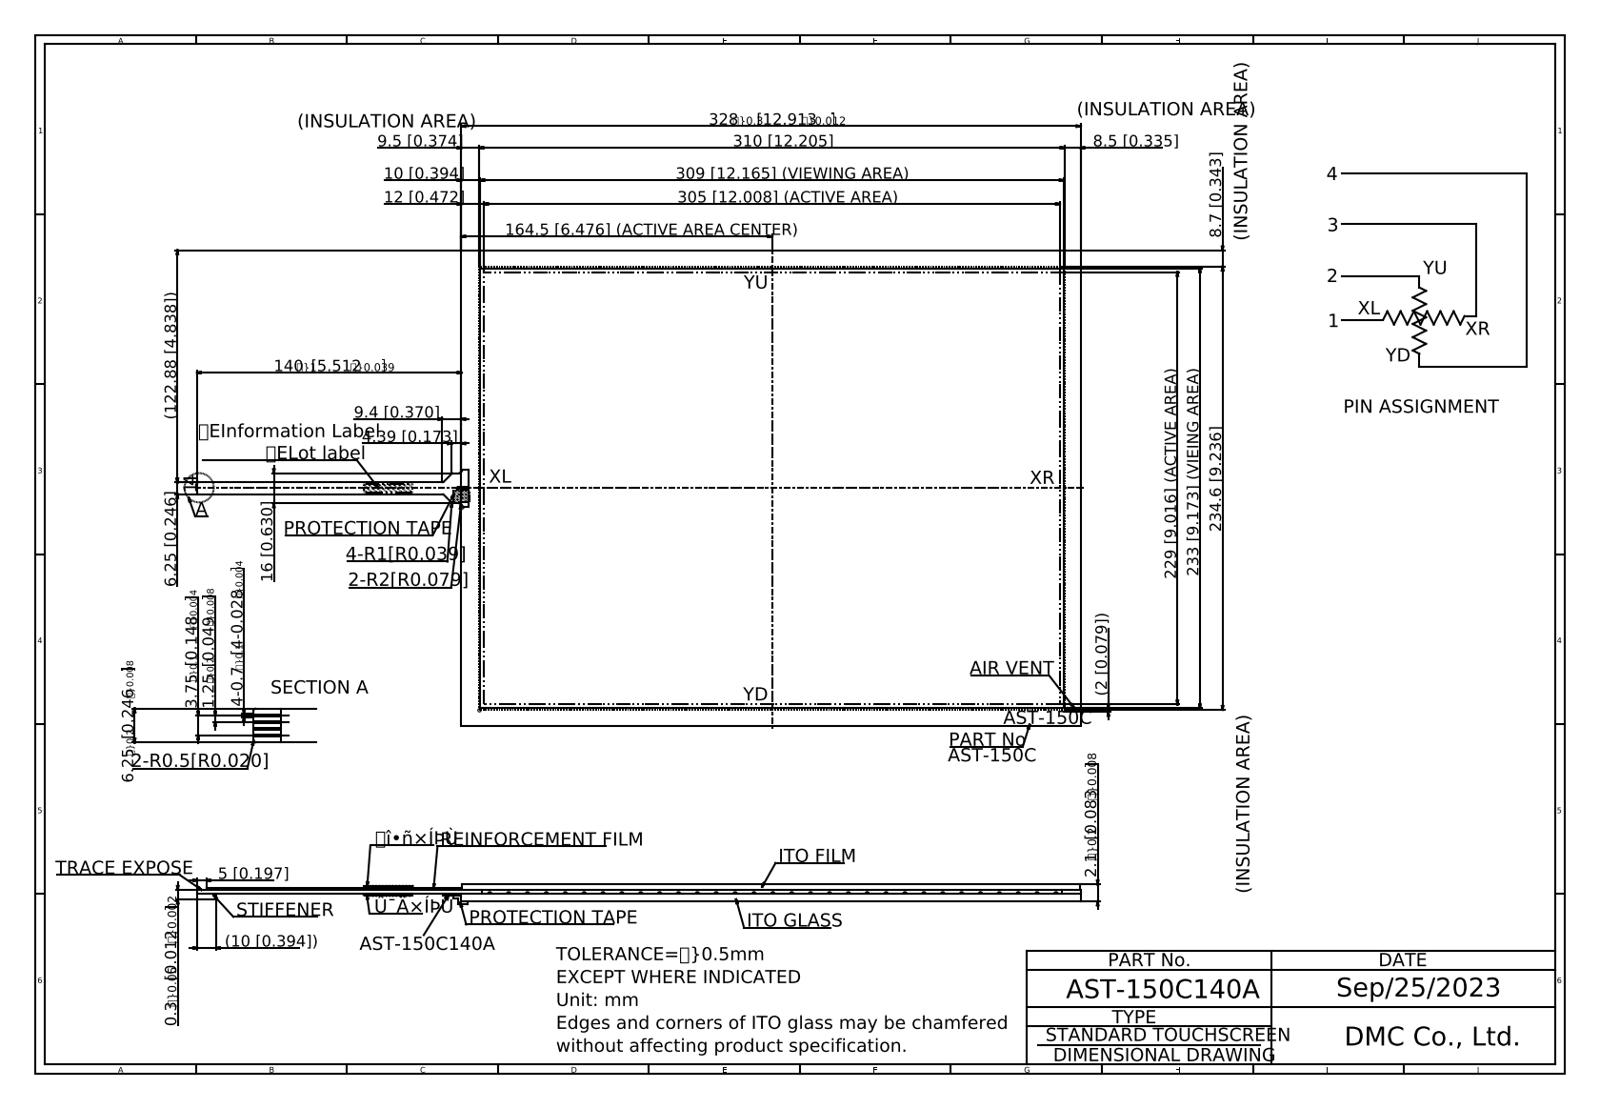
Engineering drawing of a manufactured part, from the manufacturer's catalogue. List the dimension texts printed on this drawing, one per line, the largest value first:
328.00
310 [12.205]
309 [12.165] (VIEWING AREA)
305 [12.008] (ACTIVE AREA)
234.6 [9.236]
233 [9.173] (VIEING AREA)
229 [9.016] (ACTIVE AREA)
164.5 [6.476] (ACTIVE AREA CENTER)
140.00
(122.88 [4.838])
16 [0.630]
12 [0.472]
10 [0.394]
(10 [0.394])
9.5 [0.374]
9.4 [0.370]
8.7 [0.343]
8.5 [0.335]
6.25{\H0.6x;?}0.2}[0.246{\H0.6x;?}0.008}]
6.25 [0.246]
5 [0.197]
4.39 [0.173]
4-0.7{\H0.6x;?}0.1}[4-0.028{\H0.6x;?}0.004}]
3.75{\H0.6x;?}0.1}[0.148{\H0.6x;?}0.004}]
2.1{\H0.75x;?}0.2}[0.083{\H0.75x;?}0.008}]
(2 [0.079])
1.25{\H0.6x;?}0.2}[0.049{\H0.6x;?}0.008}]
0.3{\H0.75x;?}0.05}[0.012{\H0.75x;?}0.002}]
